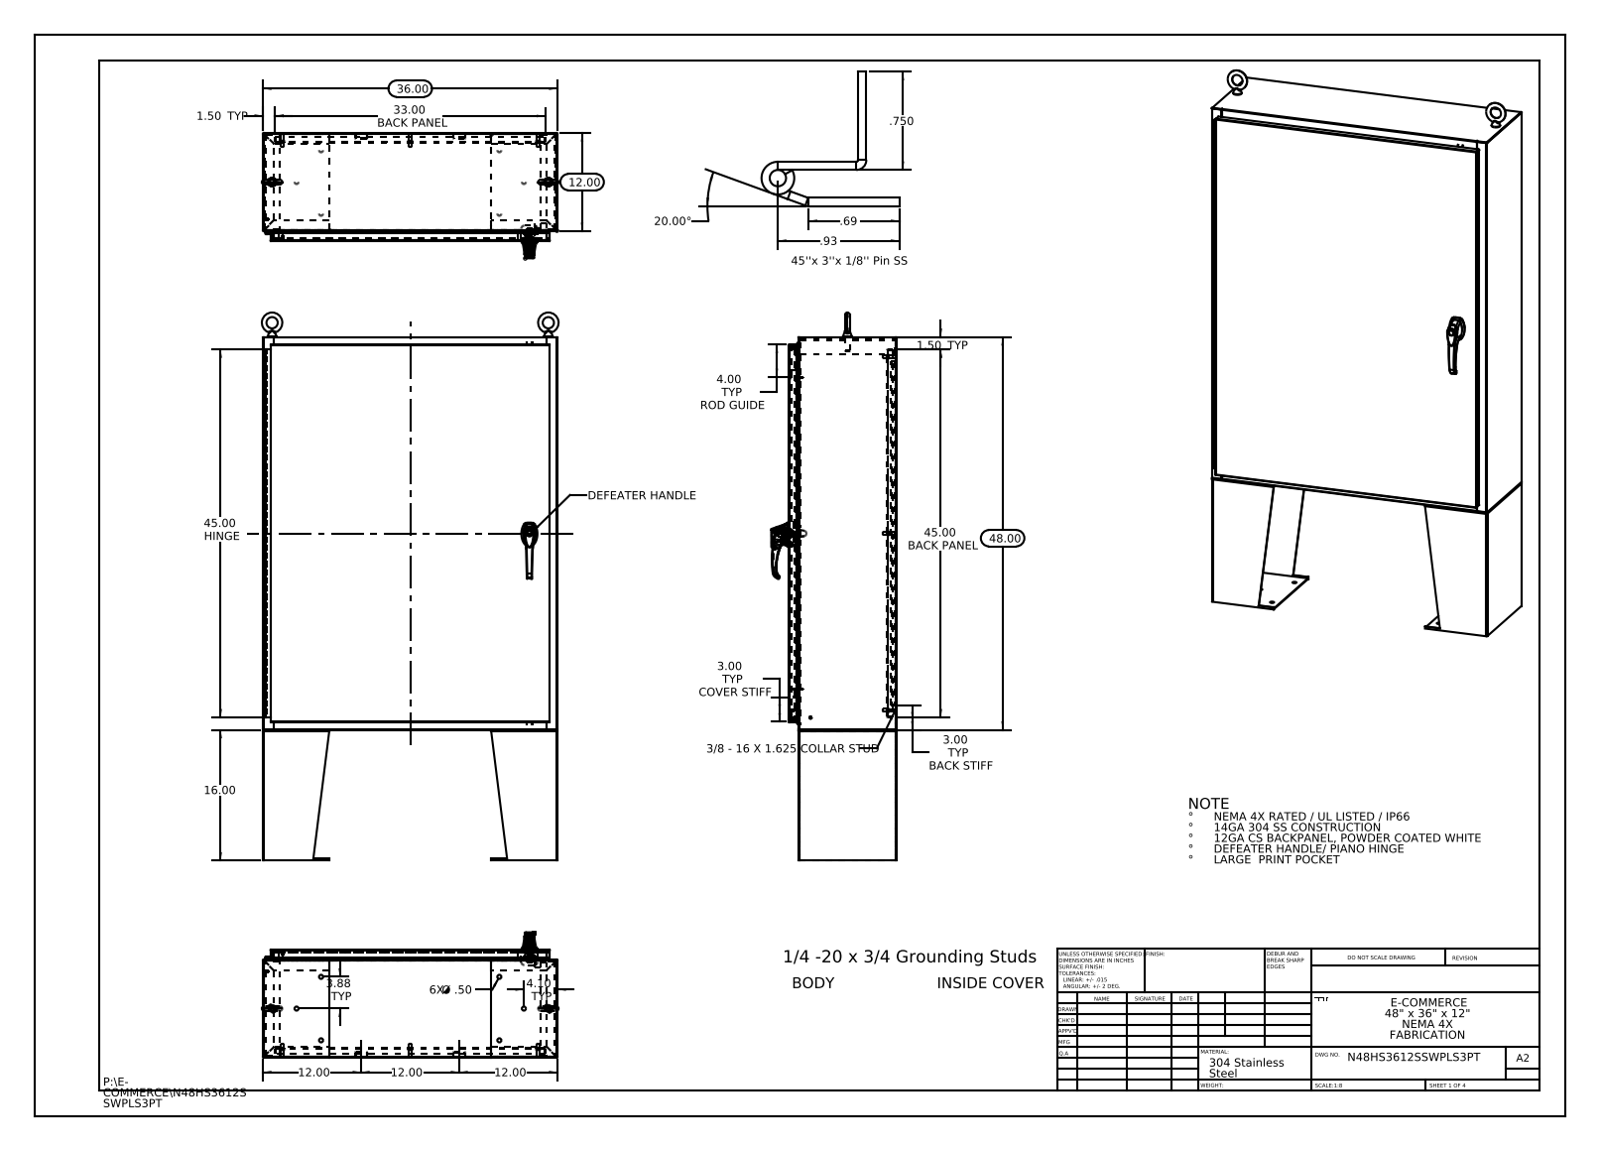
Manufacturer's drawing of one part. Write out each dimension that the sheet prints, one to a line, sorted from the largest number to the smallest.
48.00
45.00 HINGE
45.00 BACK PANEL
36.00
33.00 BACK PANEL
20.00°
16.00
12.00
12.00
12.00
12.00
4.10 TYP
4.00 TYP ROD GUIDE
3.88 TYP
3.00 TYP BACK STIFF
3.00 TYP COVER STIFF
1.50 TYP
1.50 TYP
.93
.750
.69
6X Ø .50
